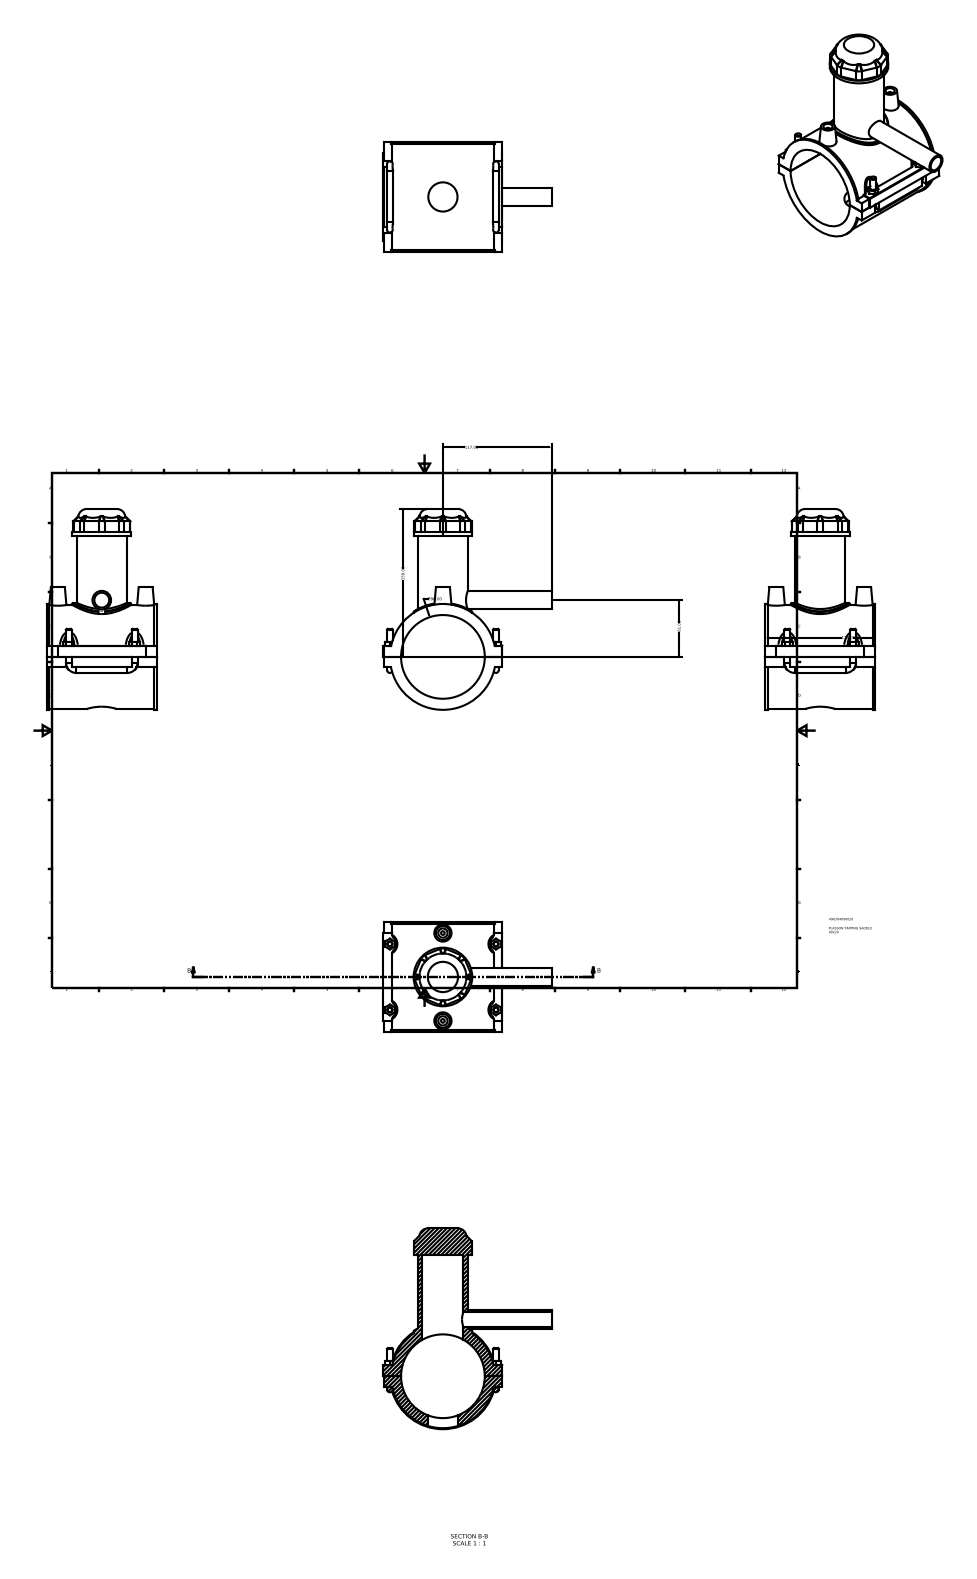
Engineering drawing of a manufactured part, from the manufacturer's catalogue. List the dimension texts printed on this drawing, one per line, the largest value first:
159.00
118.00
117.00
∅90.00
61.00
